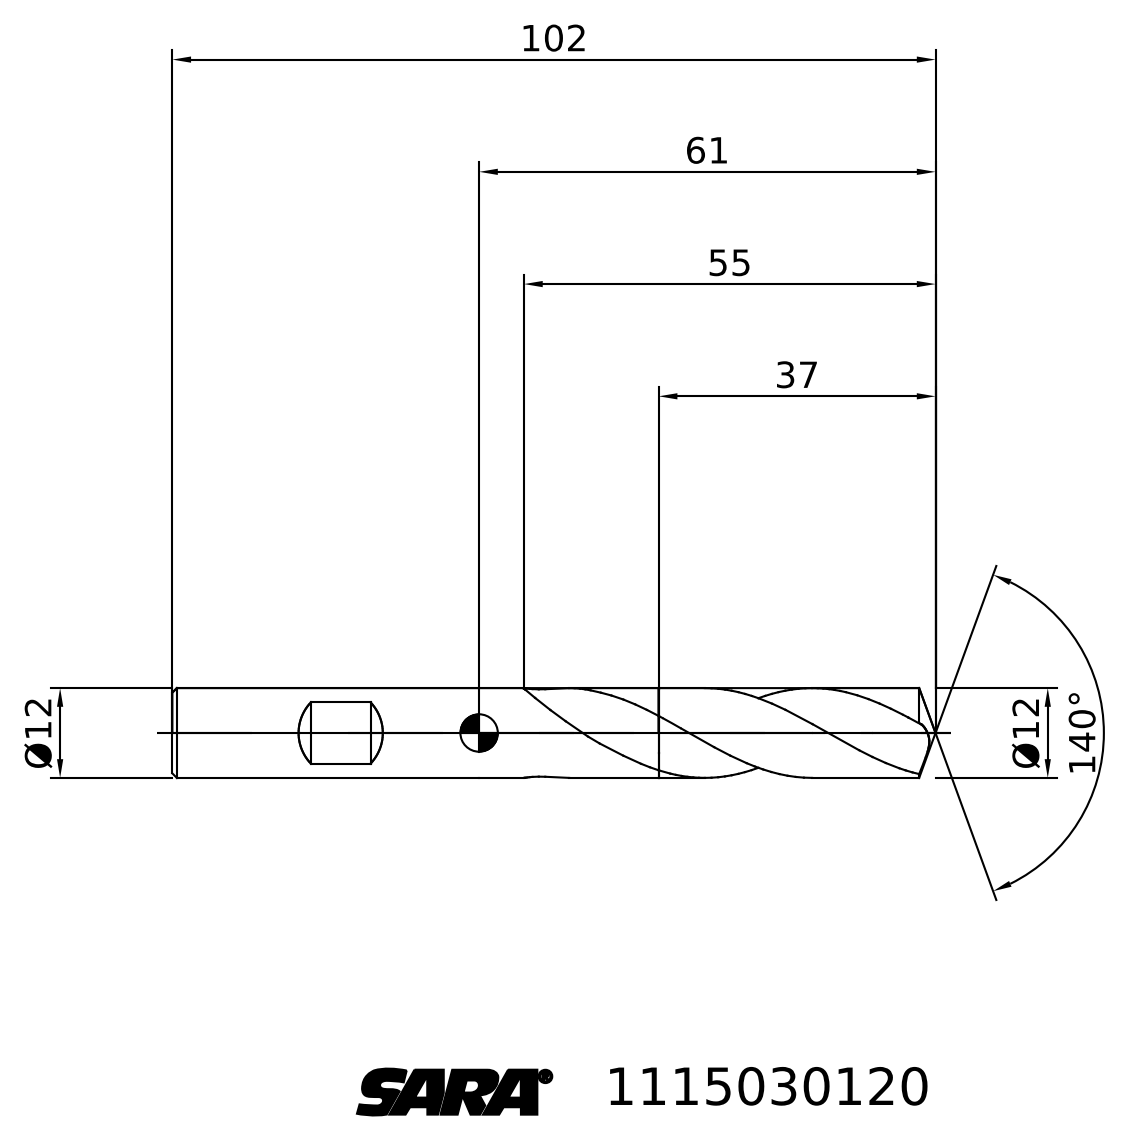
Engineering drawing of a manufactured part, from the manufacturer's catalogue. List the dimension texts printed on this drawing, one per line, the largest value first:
140°
102
61
55
37
Ø12
Ø12
